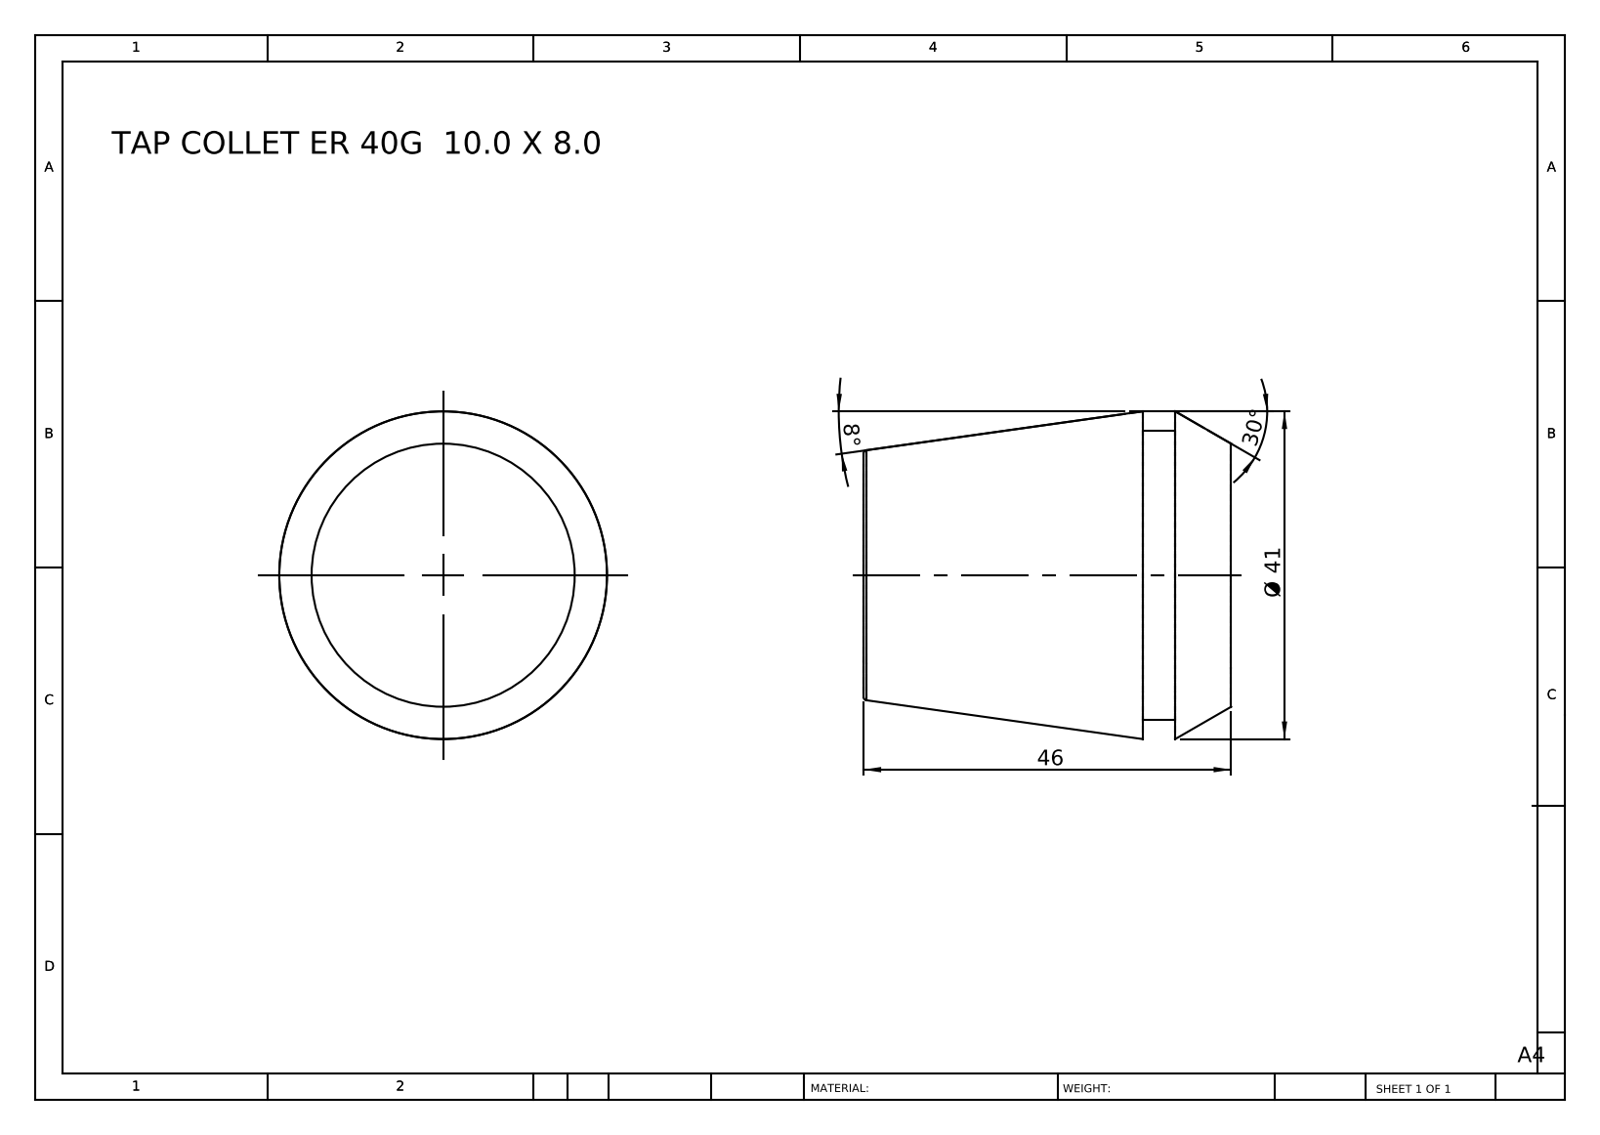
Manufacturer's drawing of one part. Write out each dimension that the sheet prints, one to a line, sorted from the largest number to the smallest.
46
Ø 41
30°
8°
